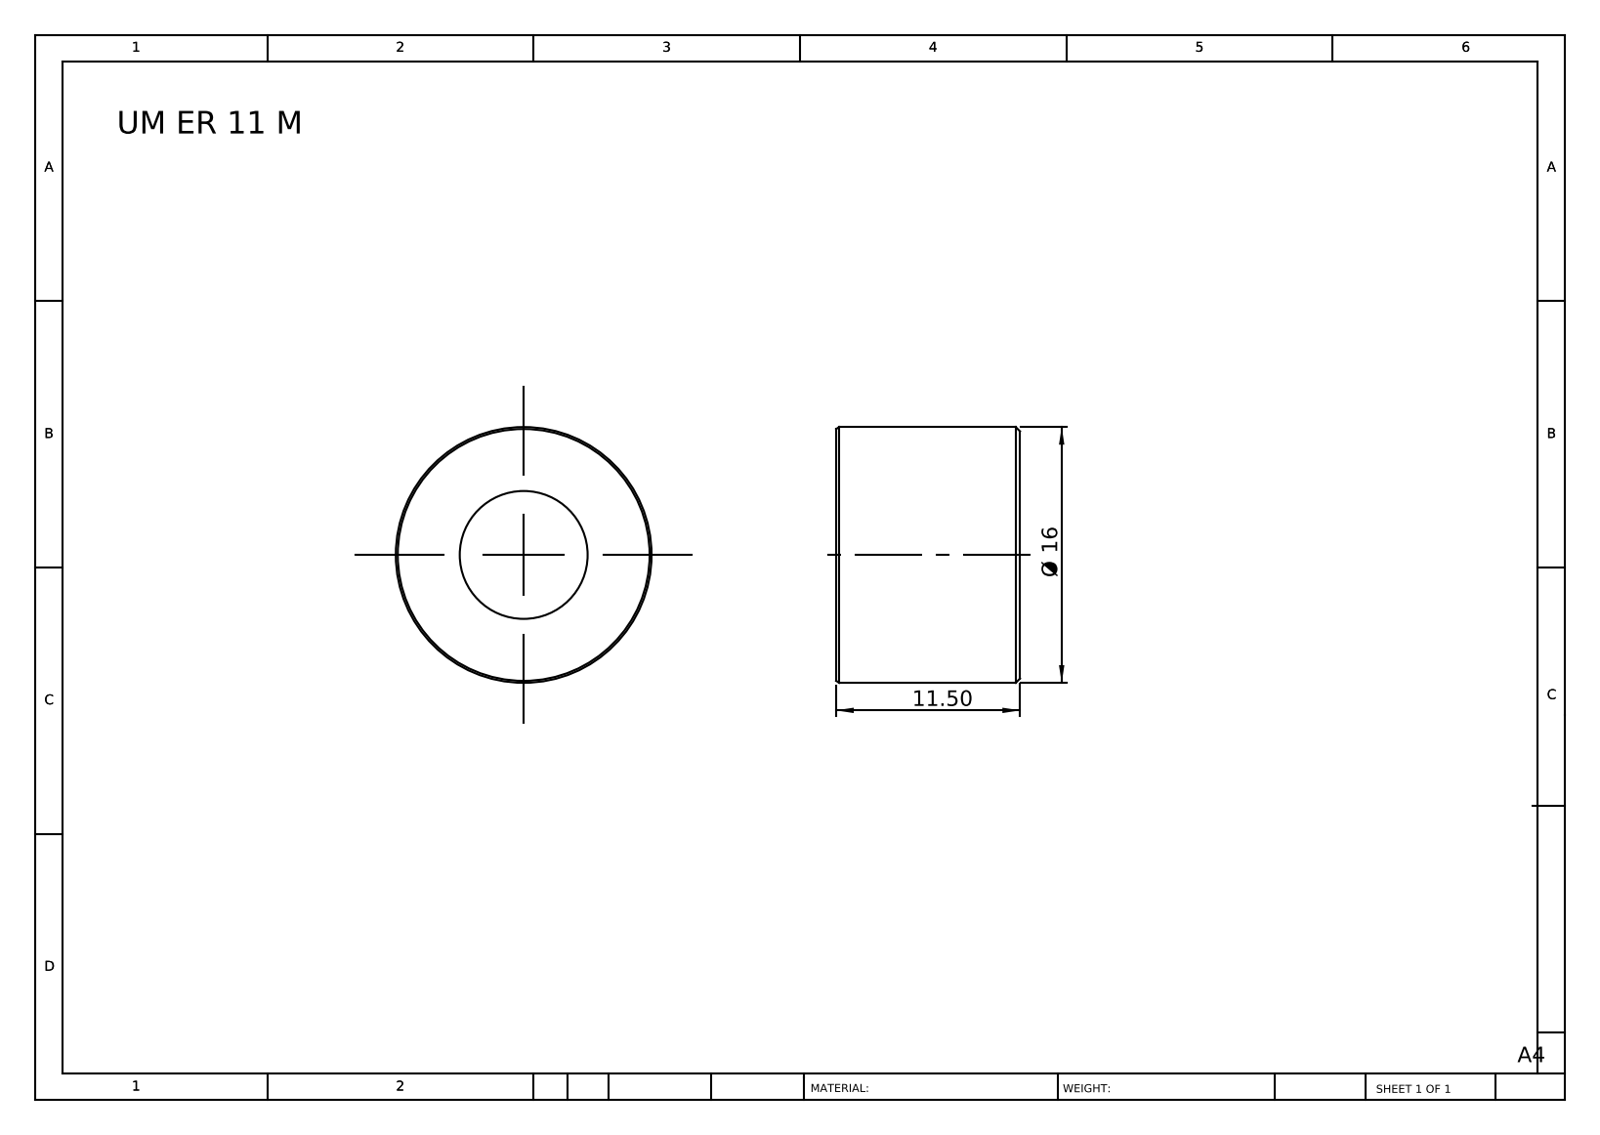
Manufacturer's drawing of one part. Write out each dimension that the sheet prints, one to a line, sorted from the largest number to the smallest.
Ø 16
11.50
